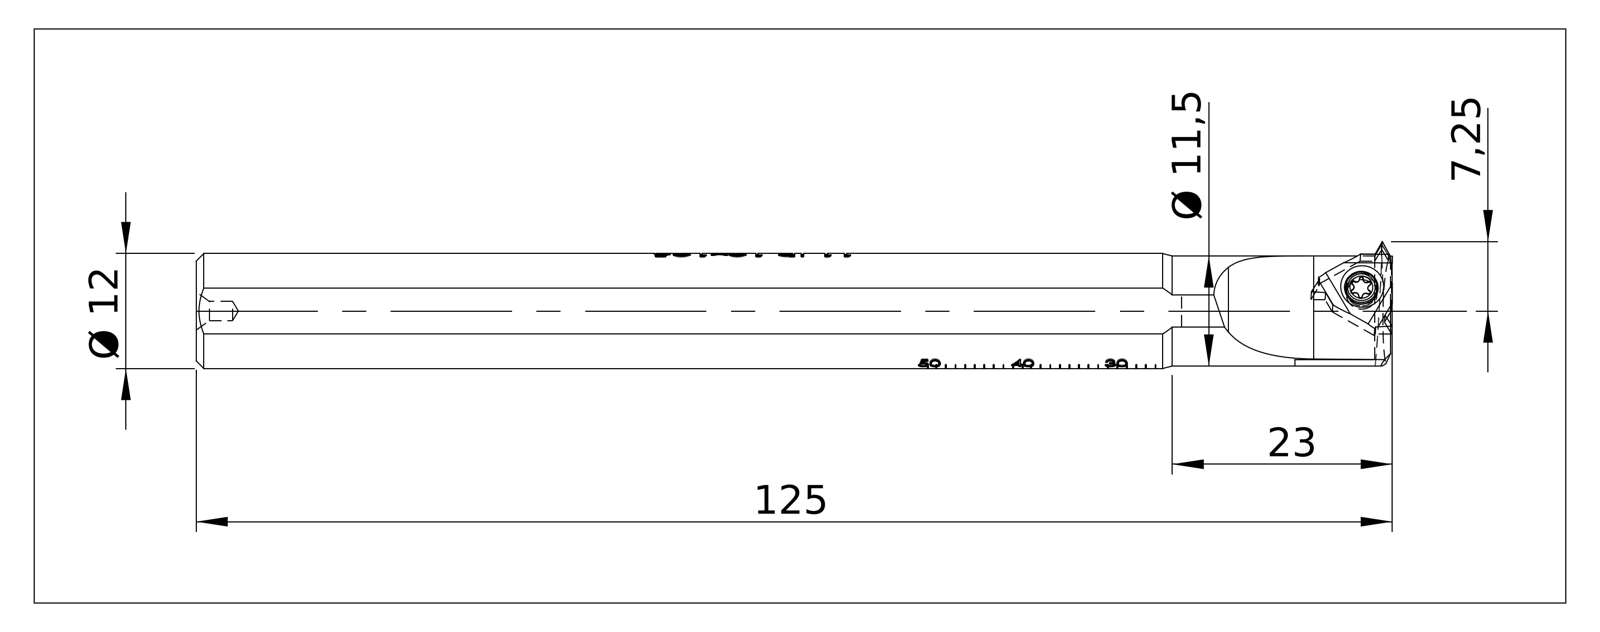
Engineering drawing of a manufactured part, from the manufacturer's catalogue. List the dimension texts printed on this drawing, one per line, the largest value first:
125
23
Ø 12
Ø 11,5
7,25
